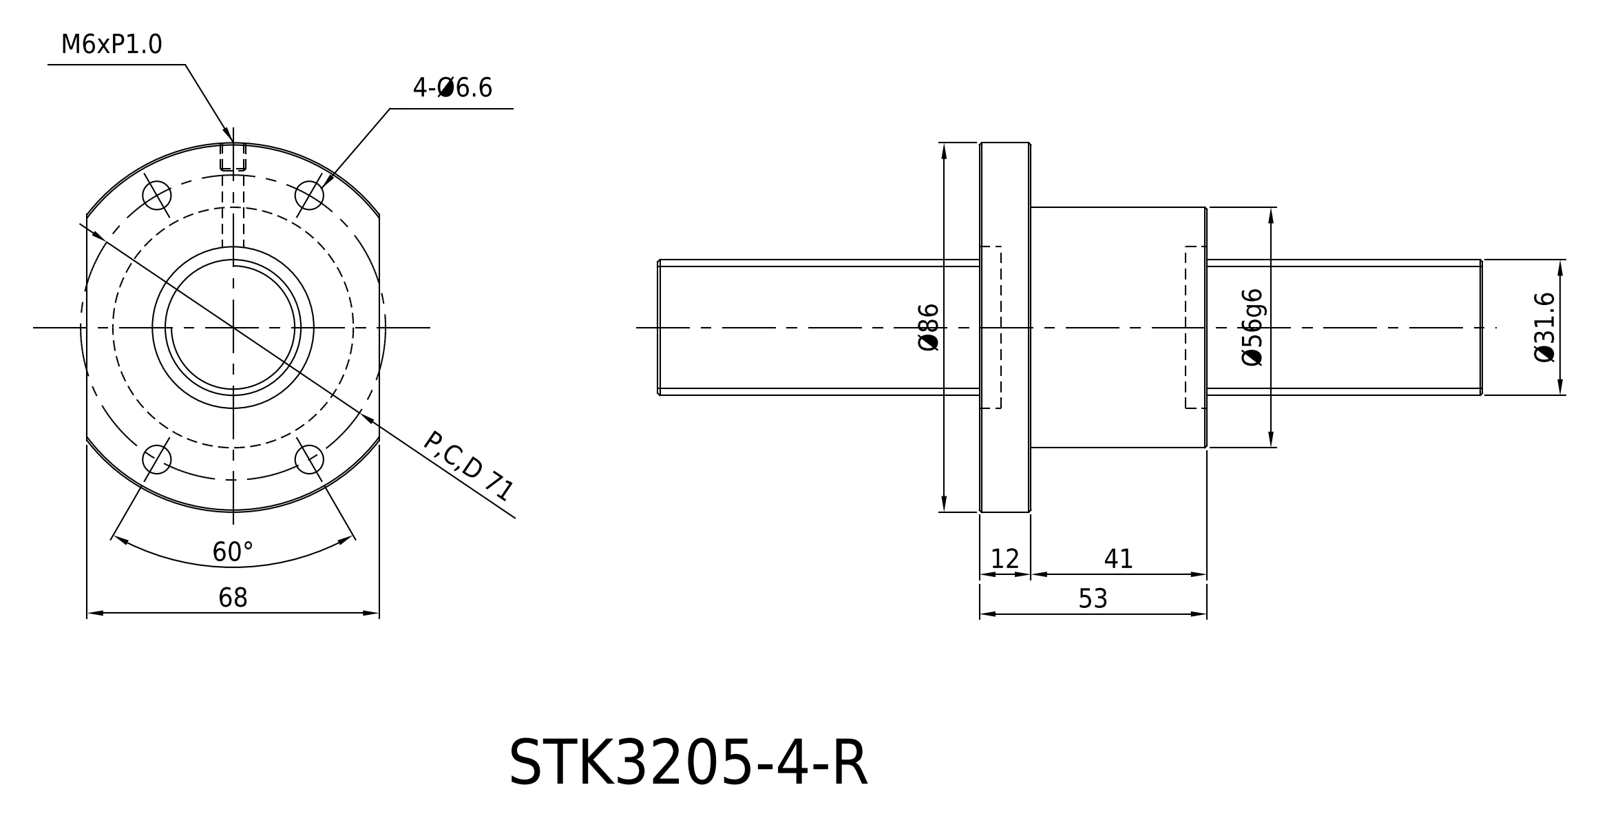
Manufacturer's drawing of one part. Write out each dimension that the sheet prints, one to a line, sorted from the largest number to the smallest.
Ø86
P,C,D 71
68
60°
Ø56g6
53
41
Ø31.6
12
